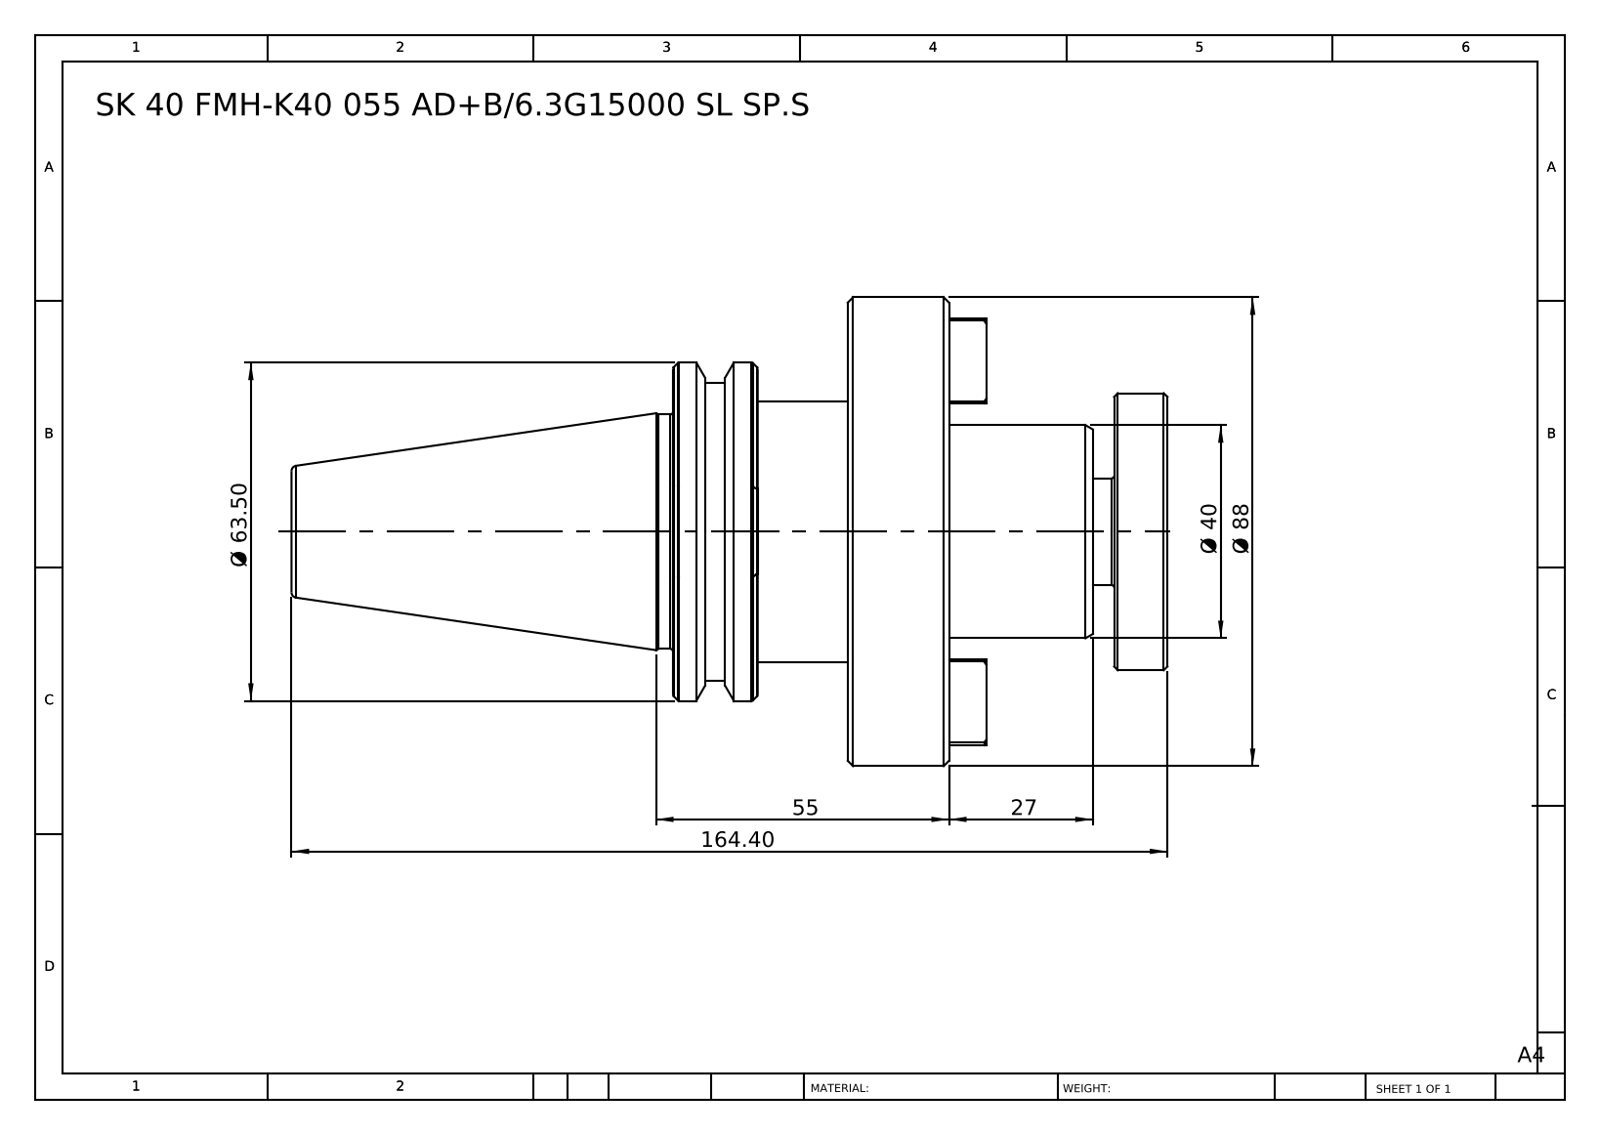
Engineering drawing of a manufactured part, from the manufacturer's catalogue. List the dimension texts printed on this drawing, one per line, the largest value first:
164.40
Ø 88
Ø 63.50
55
Ø 40
27
